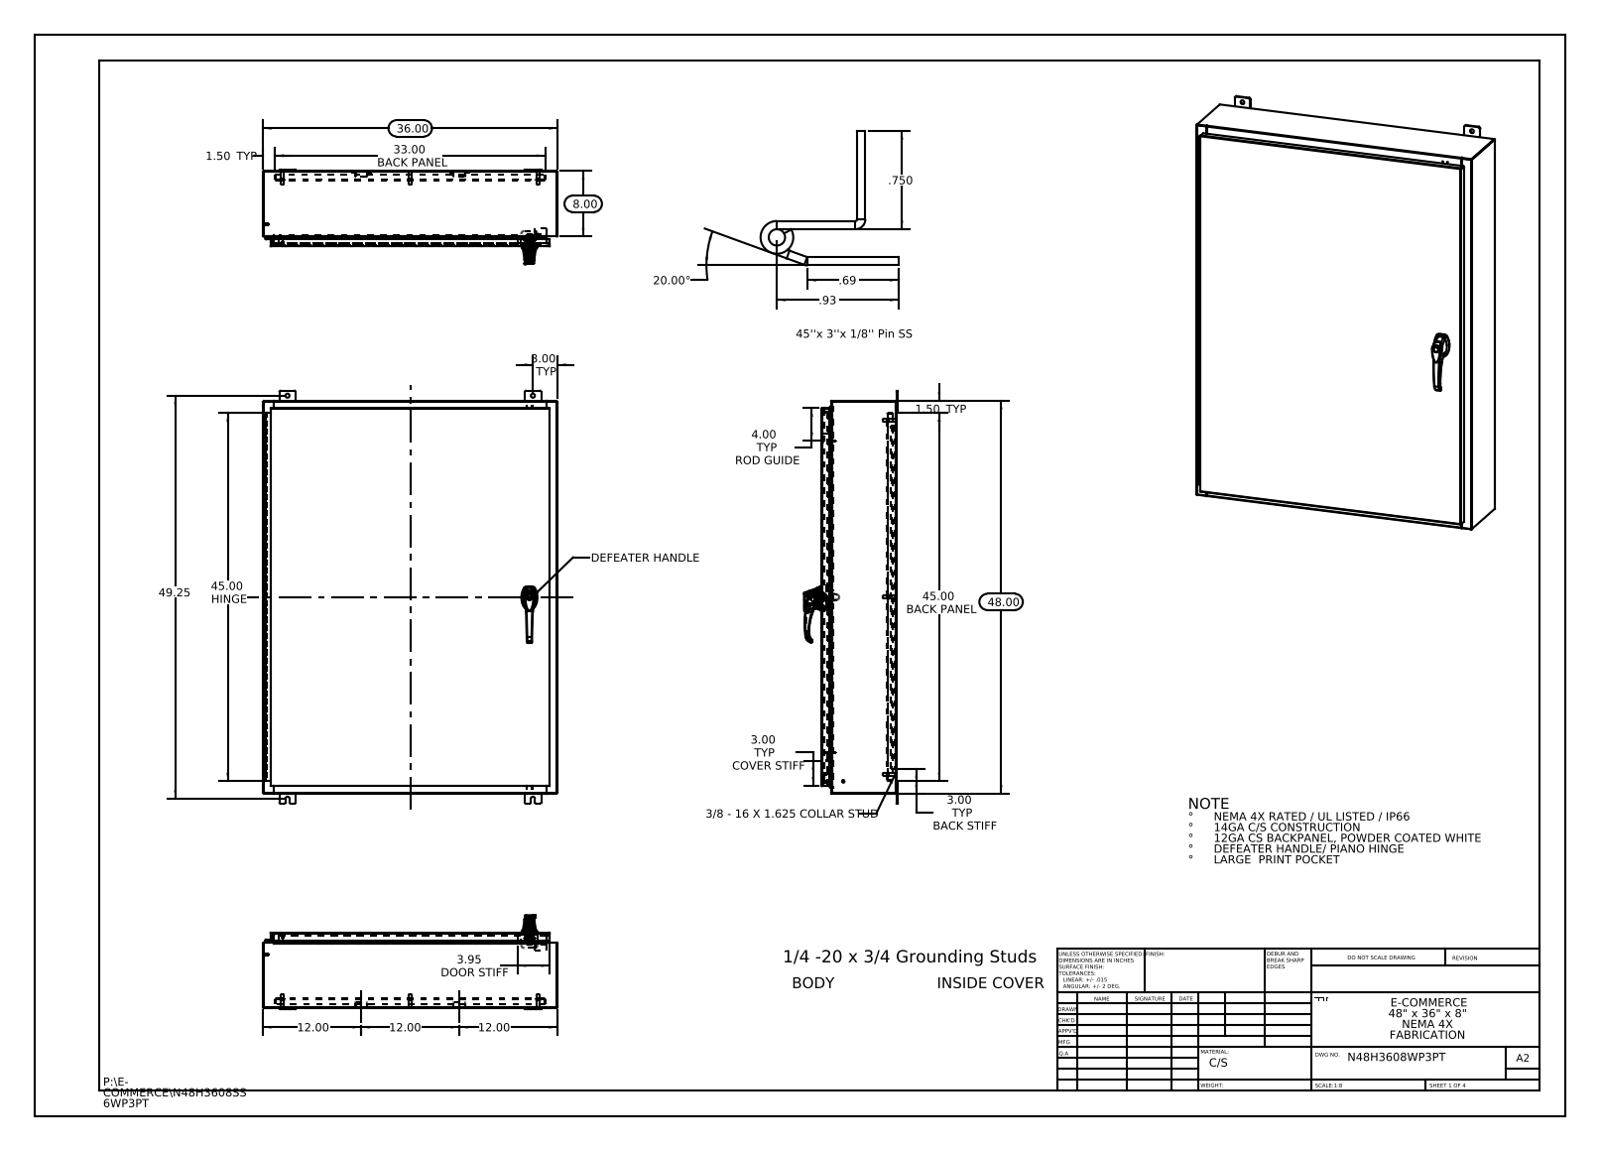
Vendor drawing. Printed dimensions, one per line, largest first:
49.25
48.00
45.00 HINGE
45.00 BACK PANEL
36.00
33.00 BACK PANEL
20.00°
12.00
12.00
12.00
8.00
4.00 TYP ROD GUIDE
3.95 DOOR STIFF
3.00 TYP
3.00 TYP BACK STIFF
3.00 TYP COVER STIFF
1.50 TYP
1.50 TYP
.93
.750
.69
